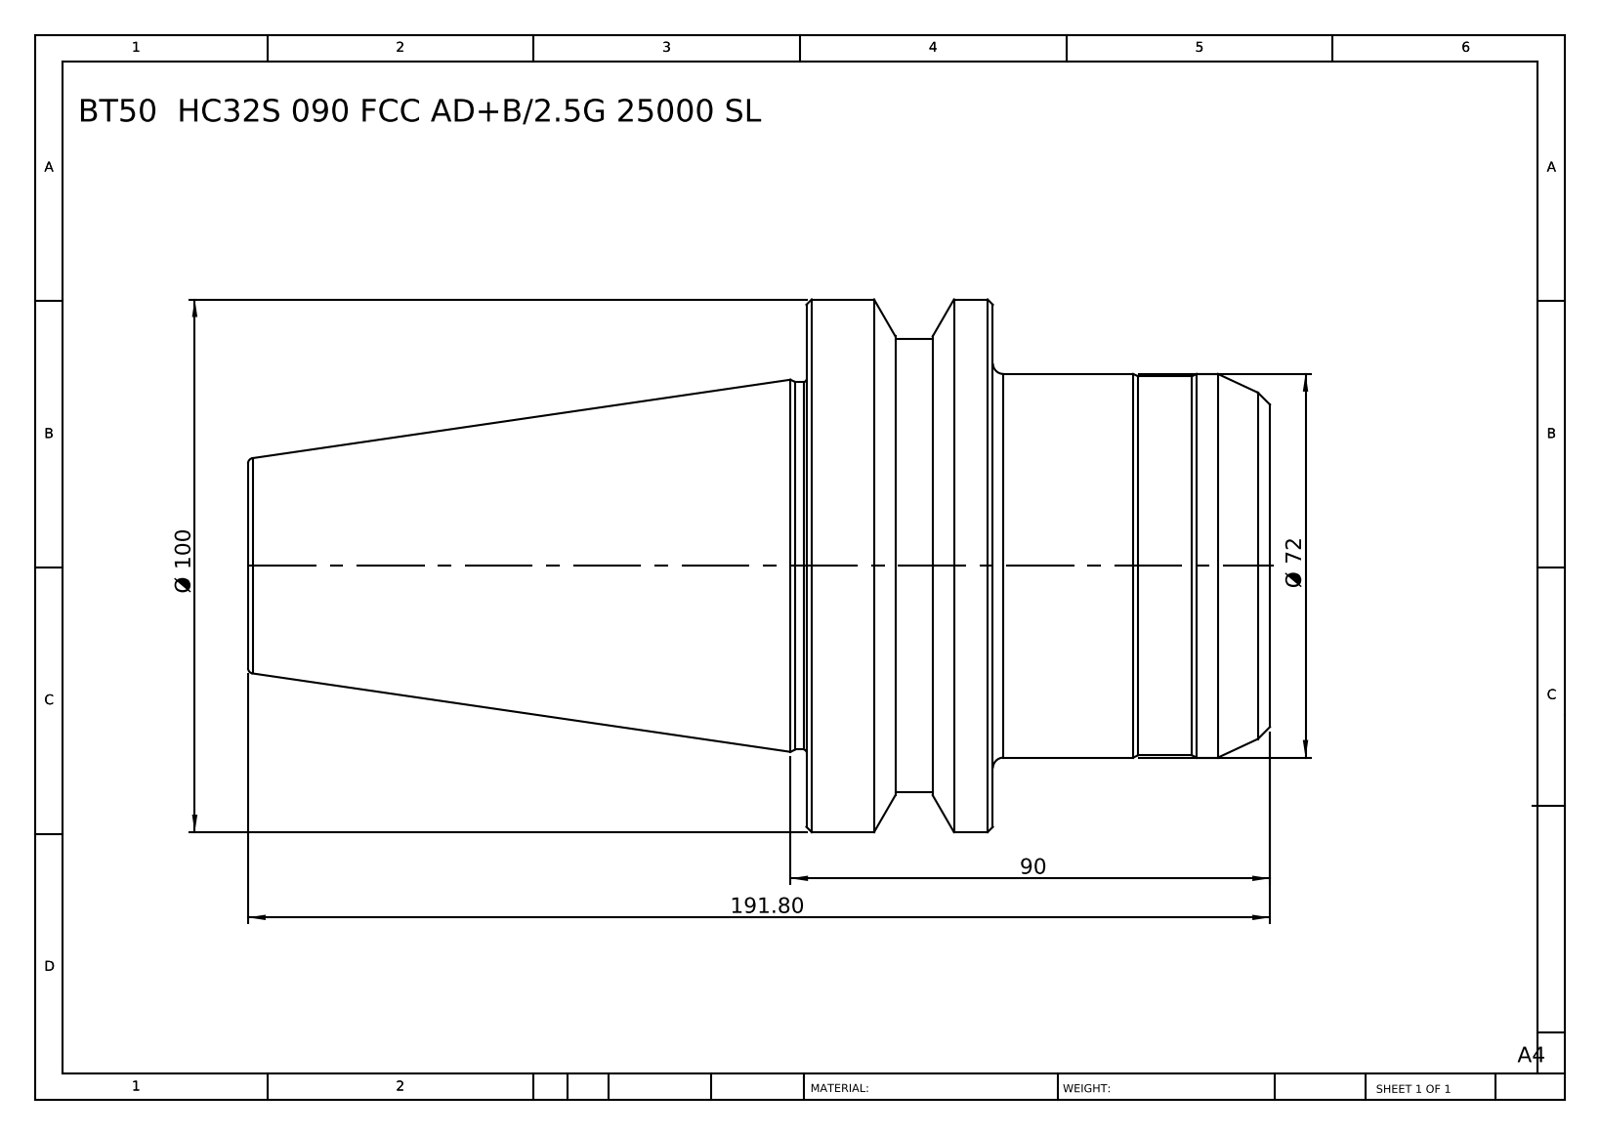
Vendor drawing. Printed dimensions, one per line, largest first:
191.80
Ø 100
90
Ø 72
